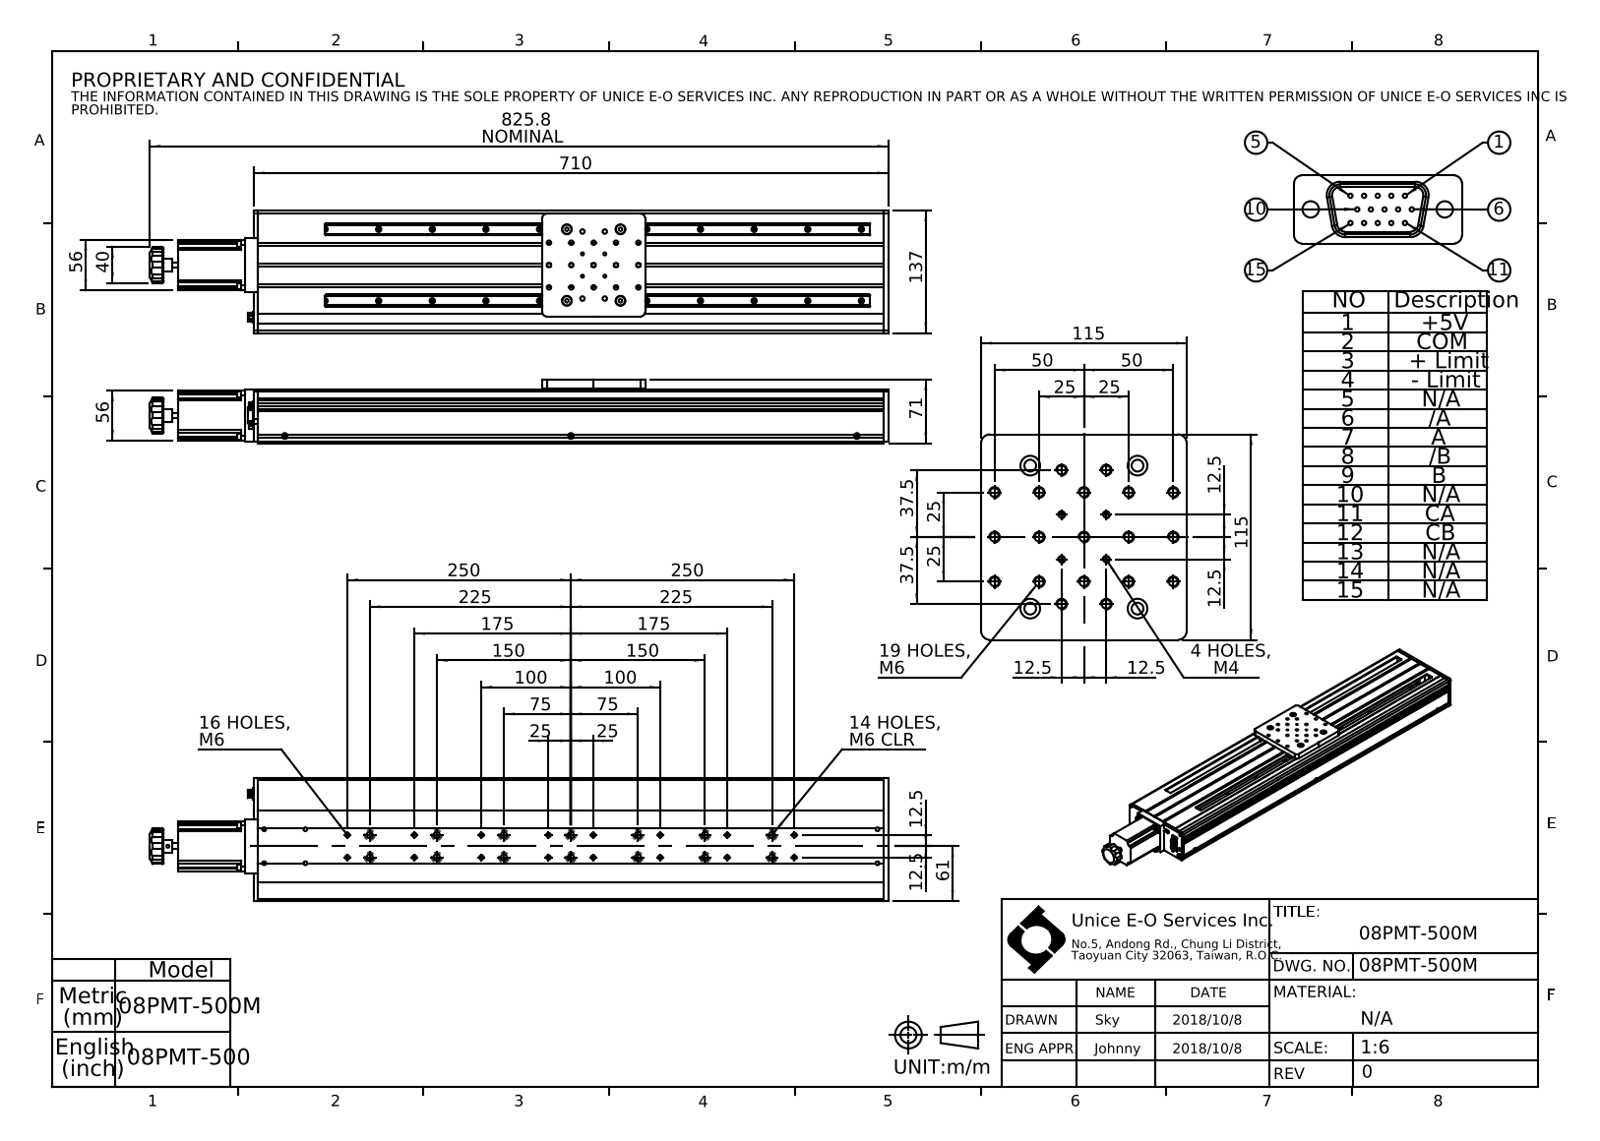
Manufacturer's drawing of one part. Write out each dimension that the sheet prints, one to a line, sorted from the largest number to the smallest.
825.8 NOMINAL
710
250
250
225
225
175
175
150
150
137
115
115
100
100
75
75
71
61
56
56
50
50
40
37.5
37.5
25
25
25
25
25
25
19 HOLES, M6
16 HOLES, M6
14 HOLES, M6 CLR
12.5
12.5
12.5
12.5
12.5
12.5
4 HOLES, M4
